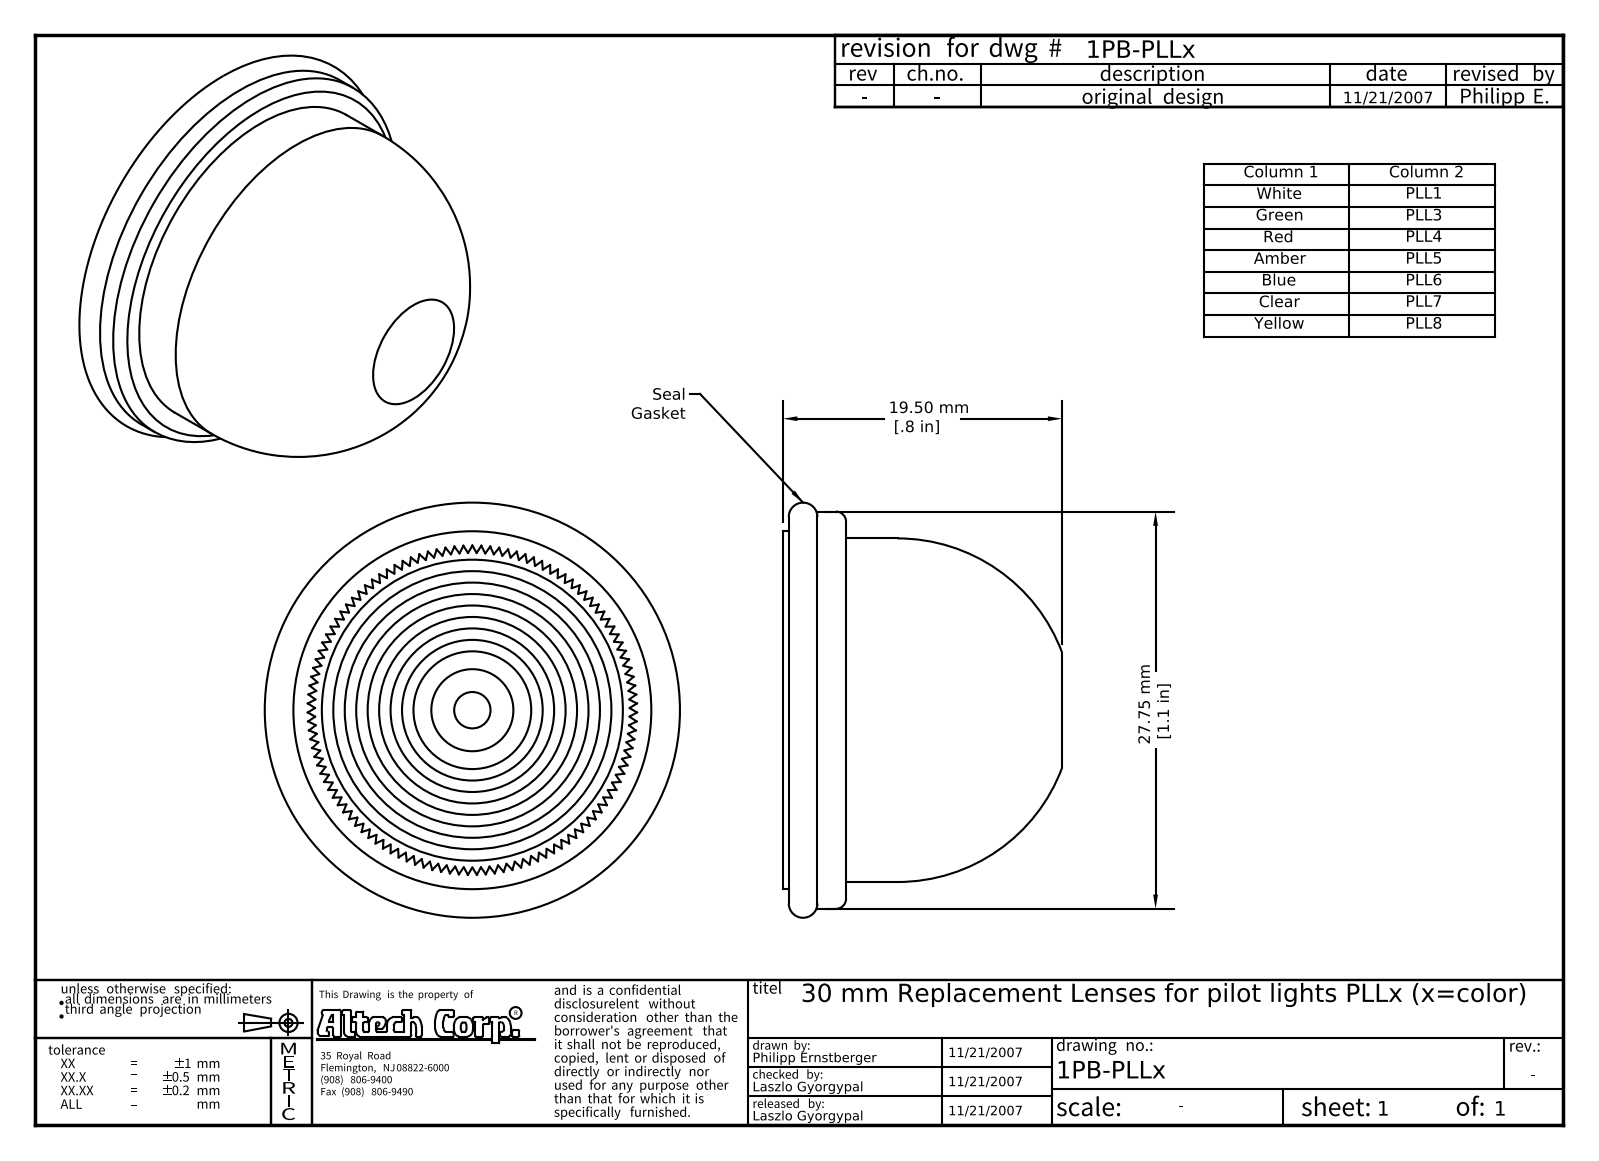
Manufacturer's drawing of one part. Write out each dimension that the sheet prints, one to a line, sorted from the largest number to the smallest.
27.75 mm [1.1 in]
19.50 mm [.8 in]
